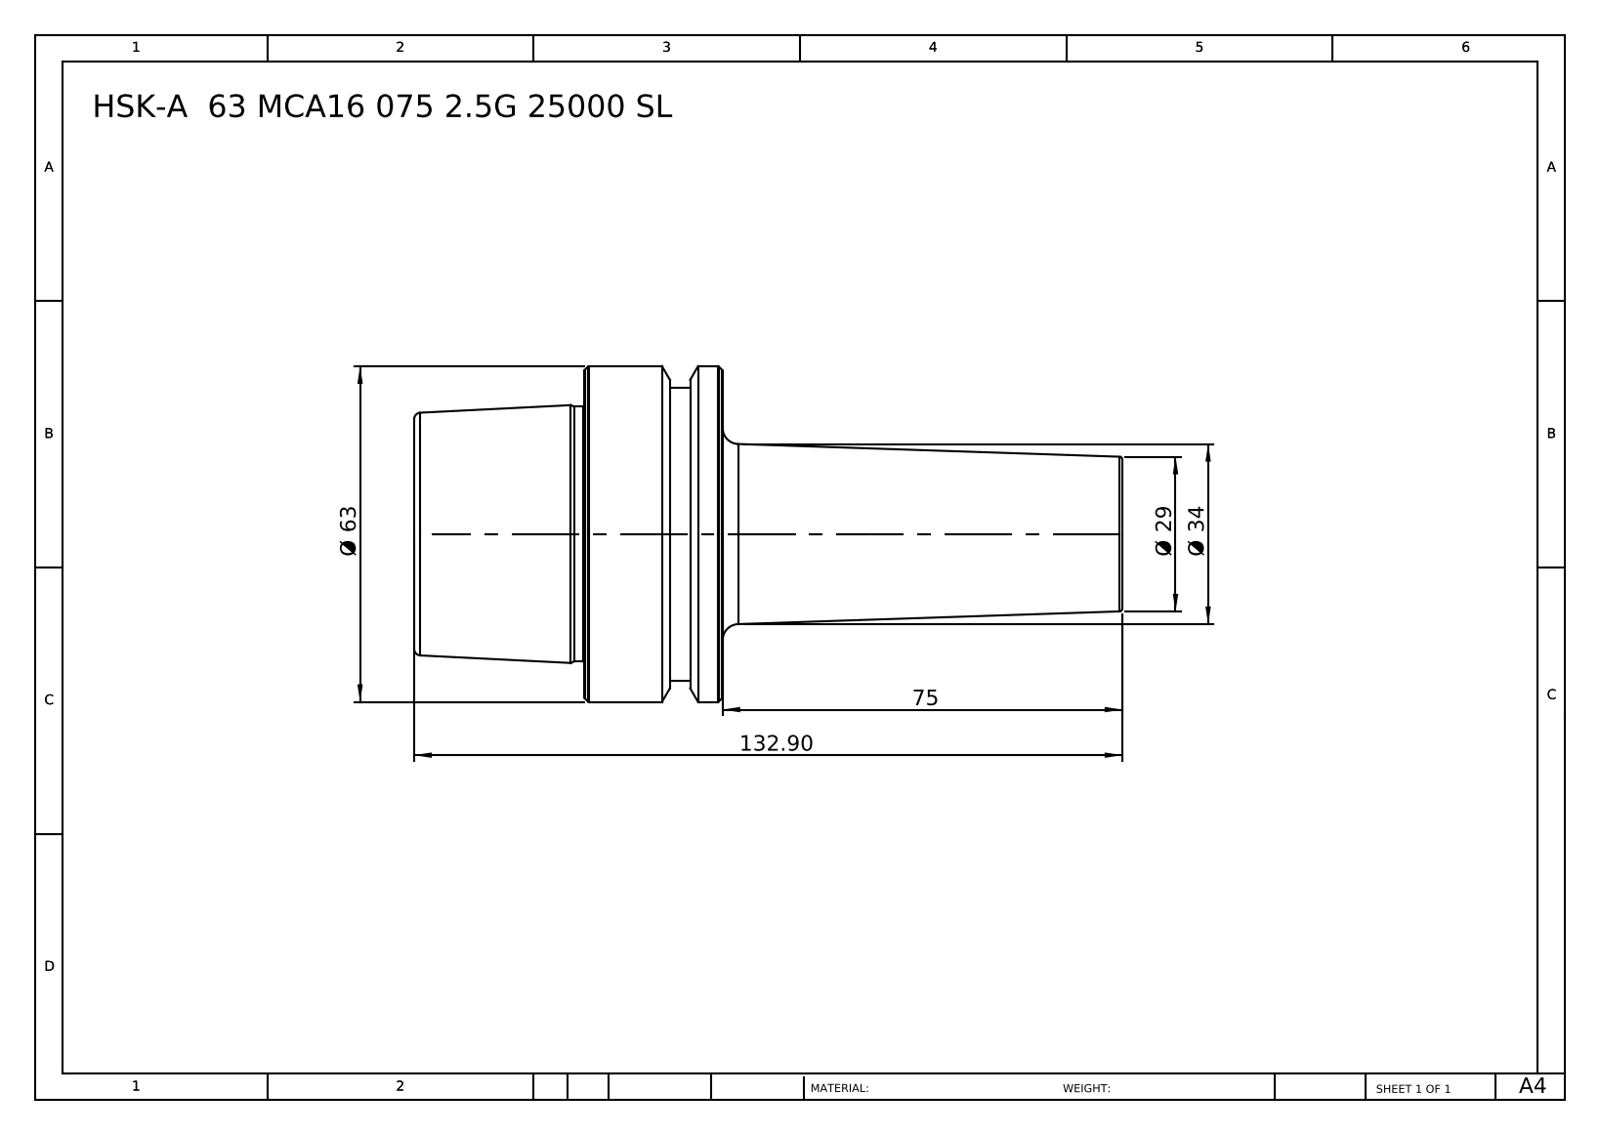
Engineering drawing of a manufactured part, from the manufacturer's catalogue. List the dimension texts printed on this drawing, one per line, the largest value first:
132.90
75
Ø 63
Ø 34
Ø 29
